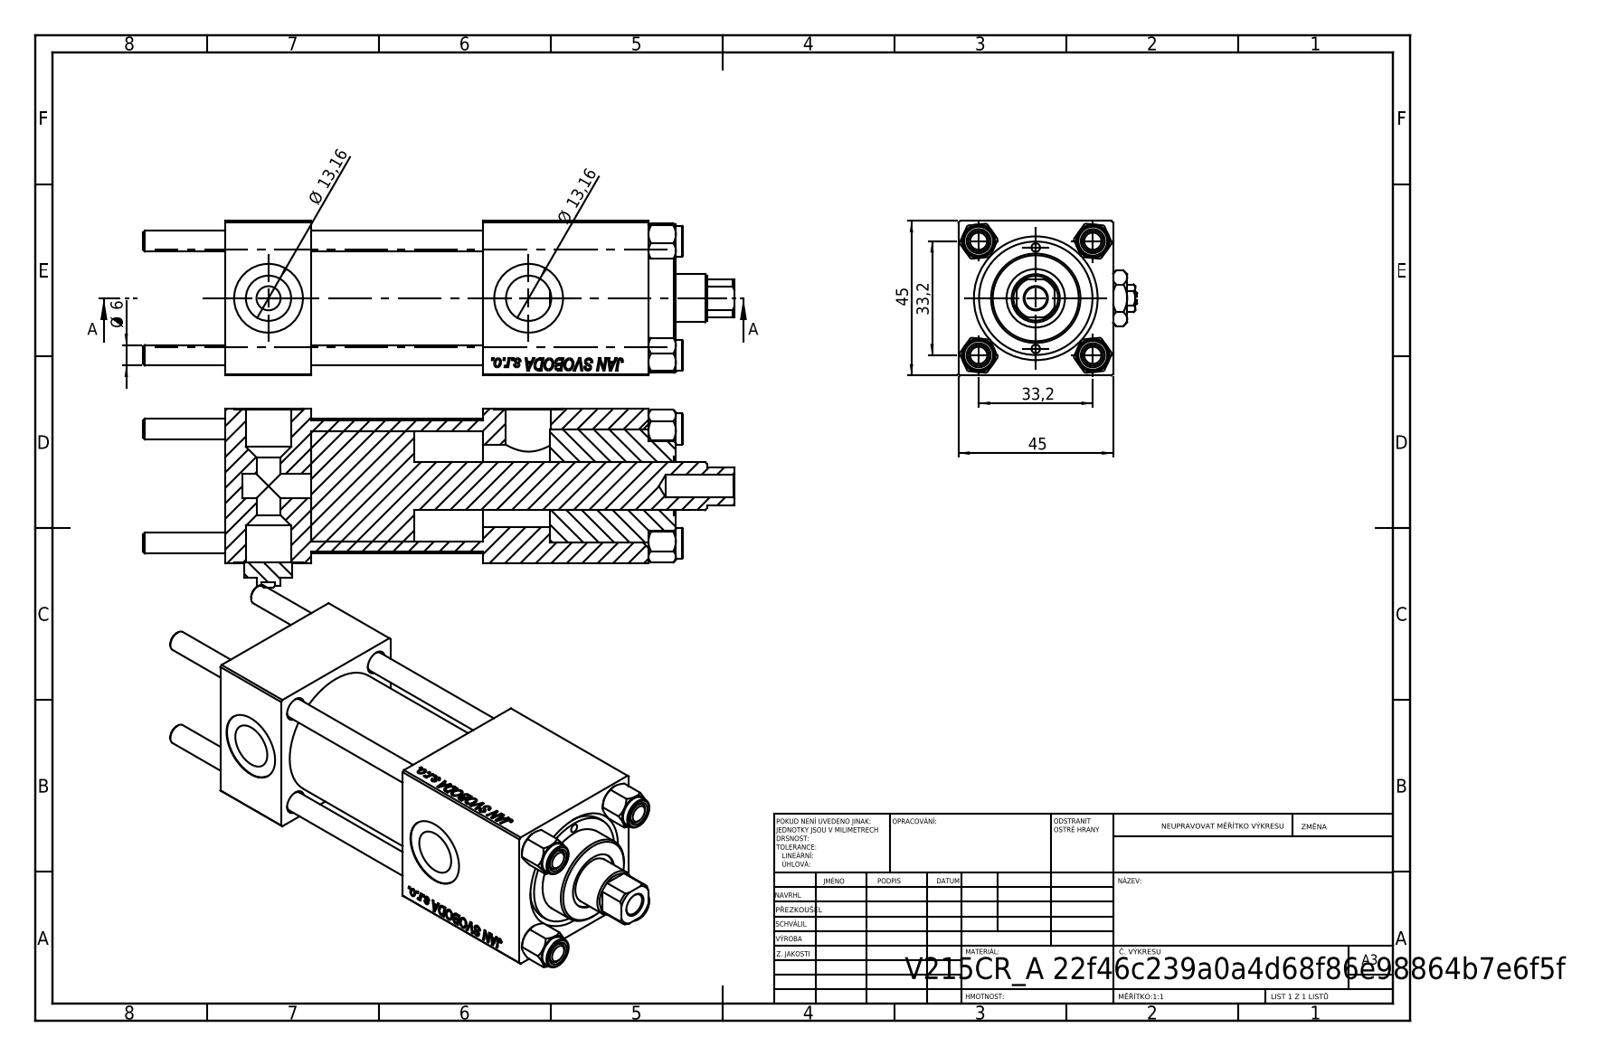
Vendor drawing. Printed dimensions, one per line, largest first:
45
45
33,2
33,2
Ø 13,16
Ø 13,16
Ø 6
